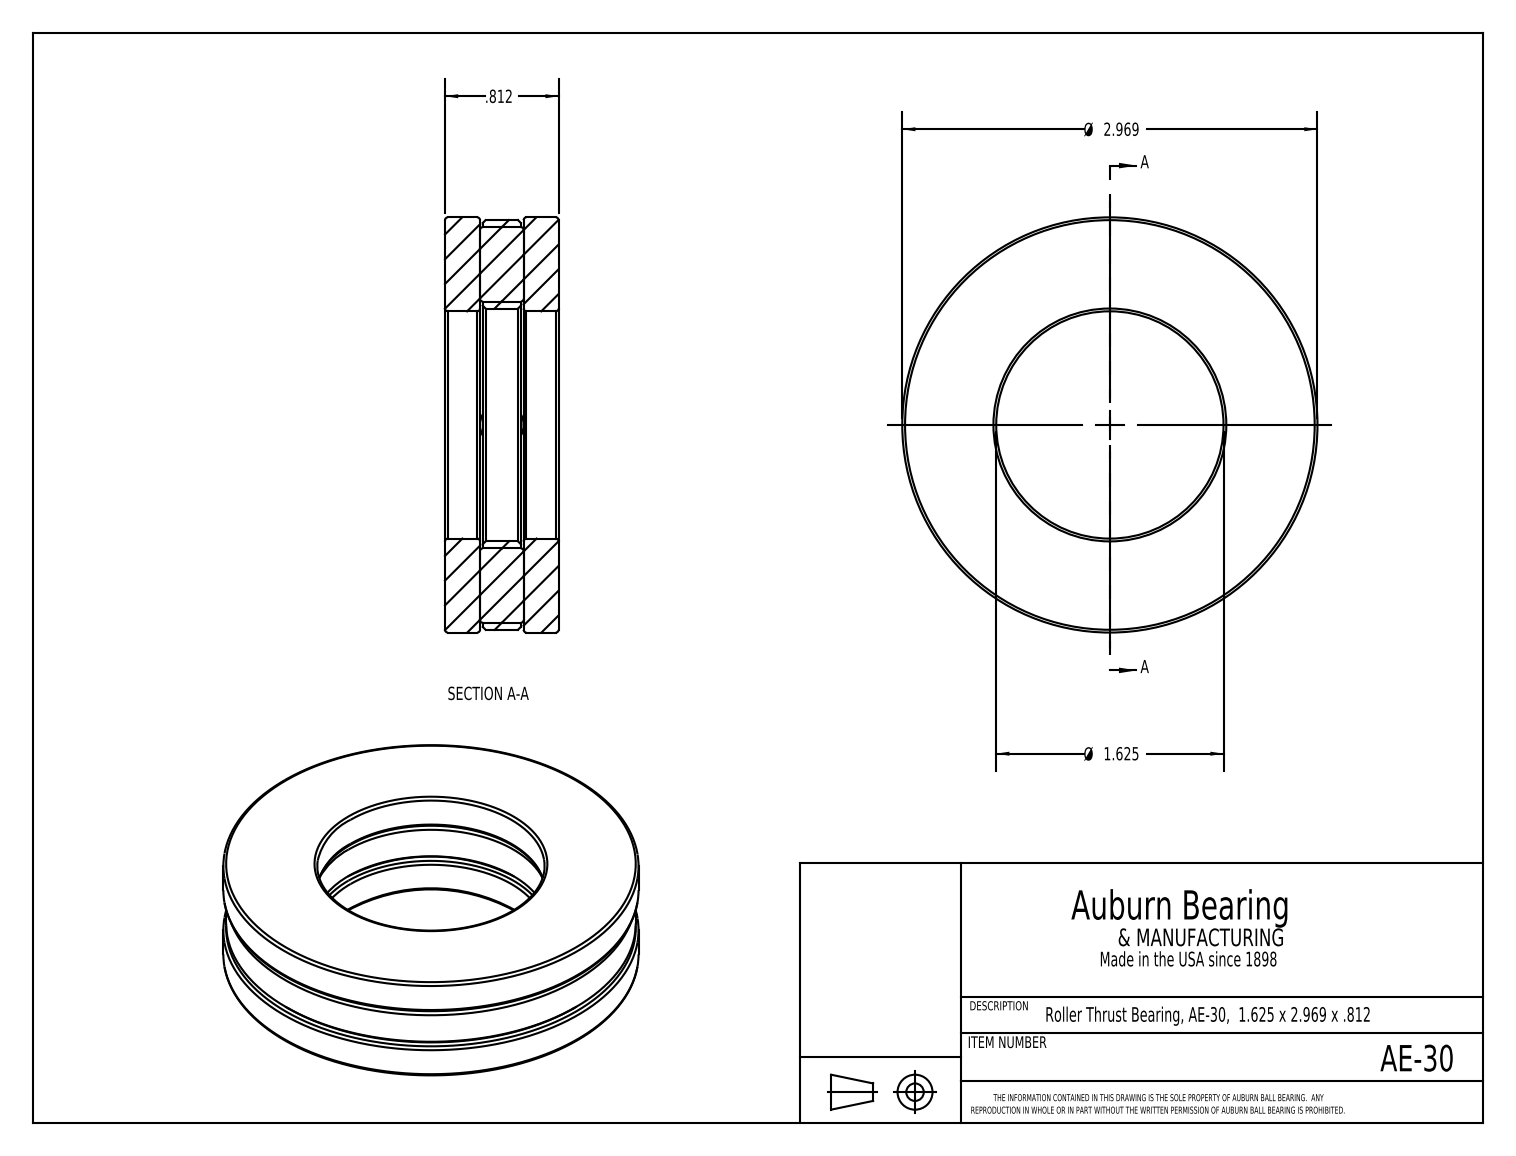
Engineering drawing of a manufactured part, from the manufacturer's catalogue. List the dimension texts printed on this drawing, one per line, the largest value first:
Ø 2.969
Ø 1.625
.812
